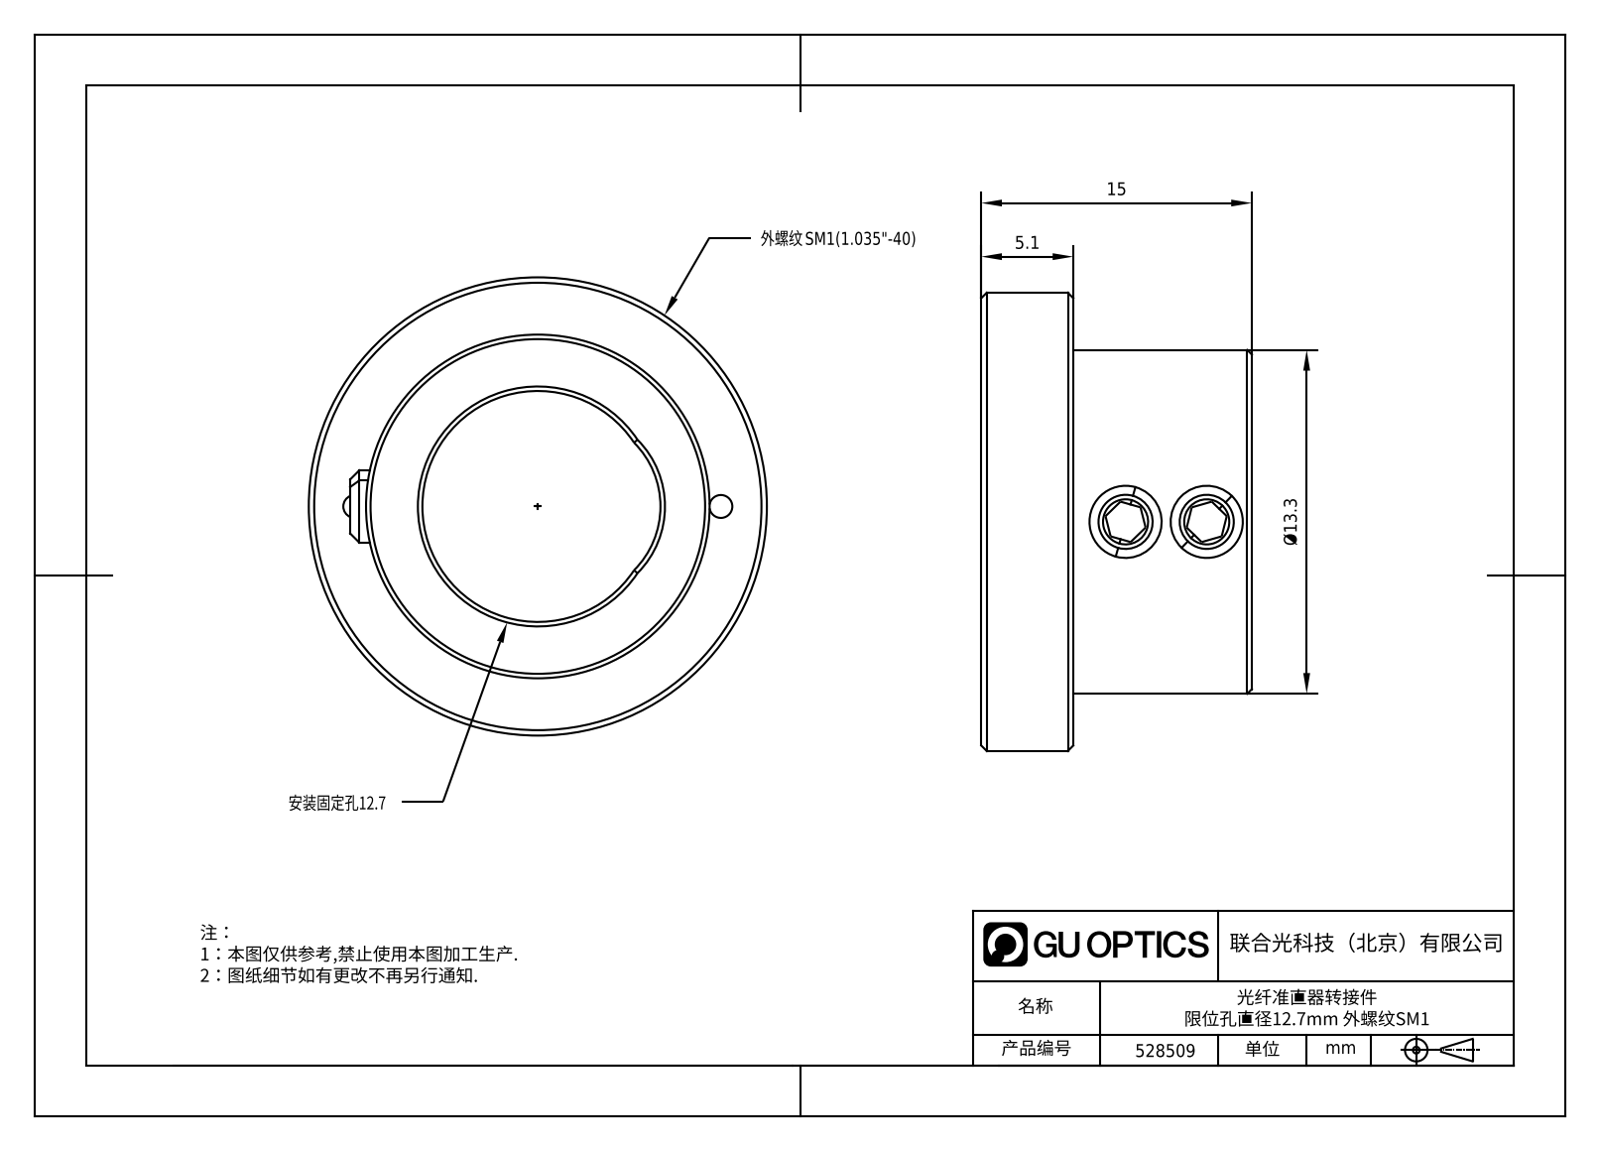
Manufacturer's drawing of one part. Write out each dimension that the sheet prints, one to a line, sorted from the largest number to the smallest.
15
Ø13.3
5.1
